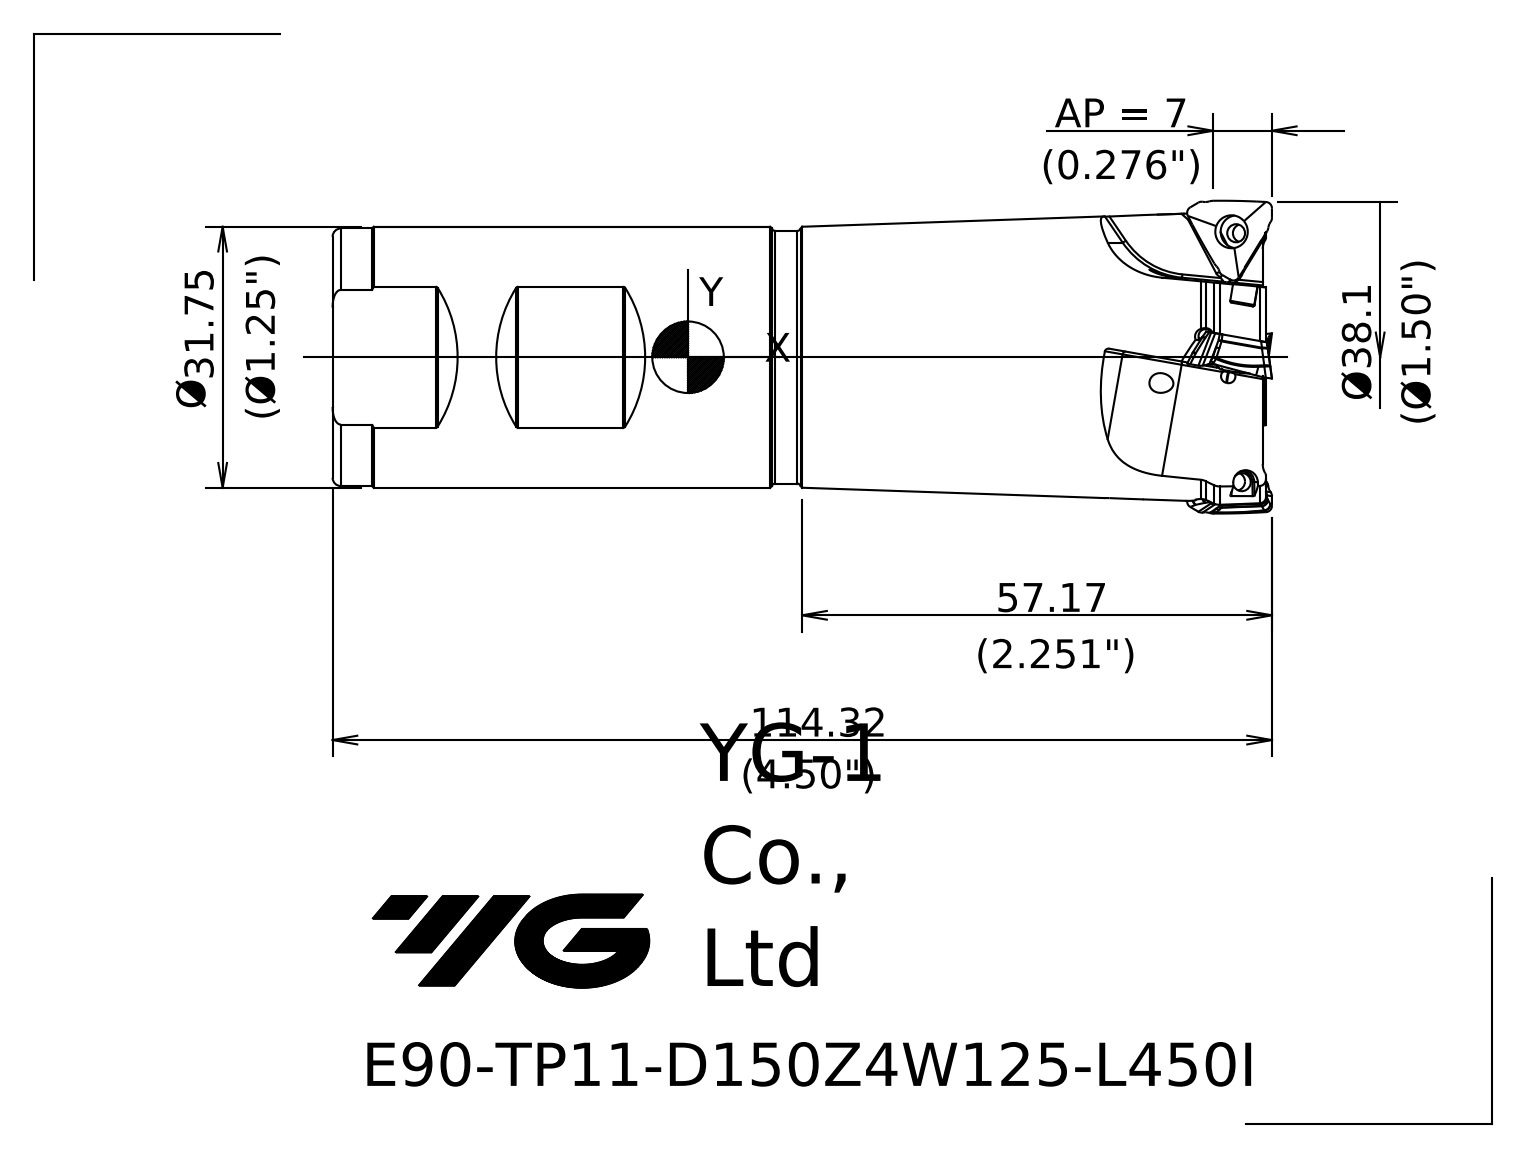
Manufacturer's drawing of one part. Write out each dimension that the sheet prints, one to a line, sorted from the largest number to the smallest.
114.32
57.17
Ø 31.75
AP = 7
